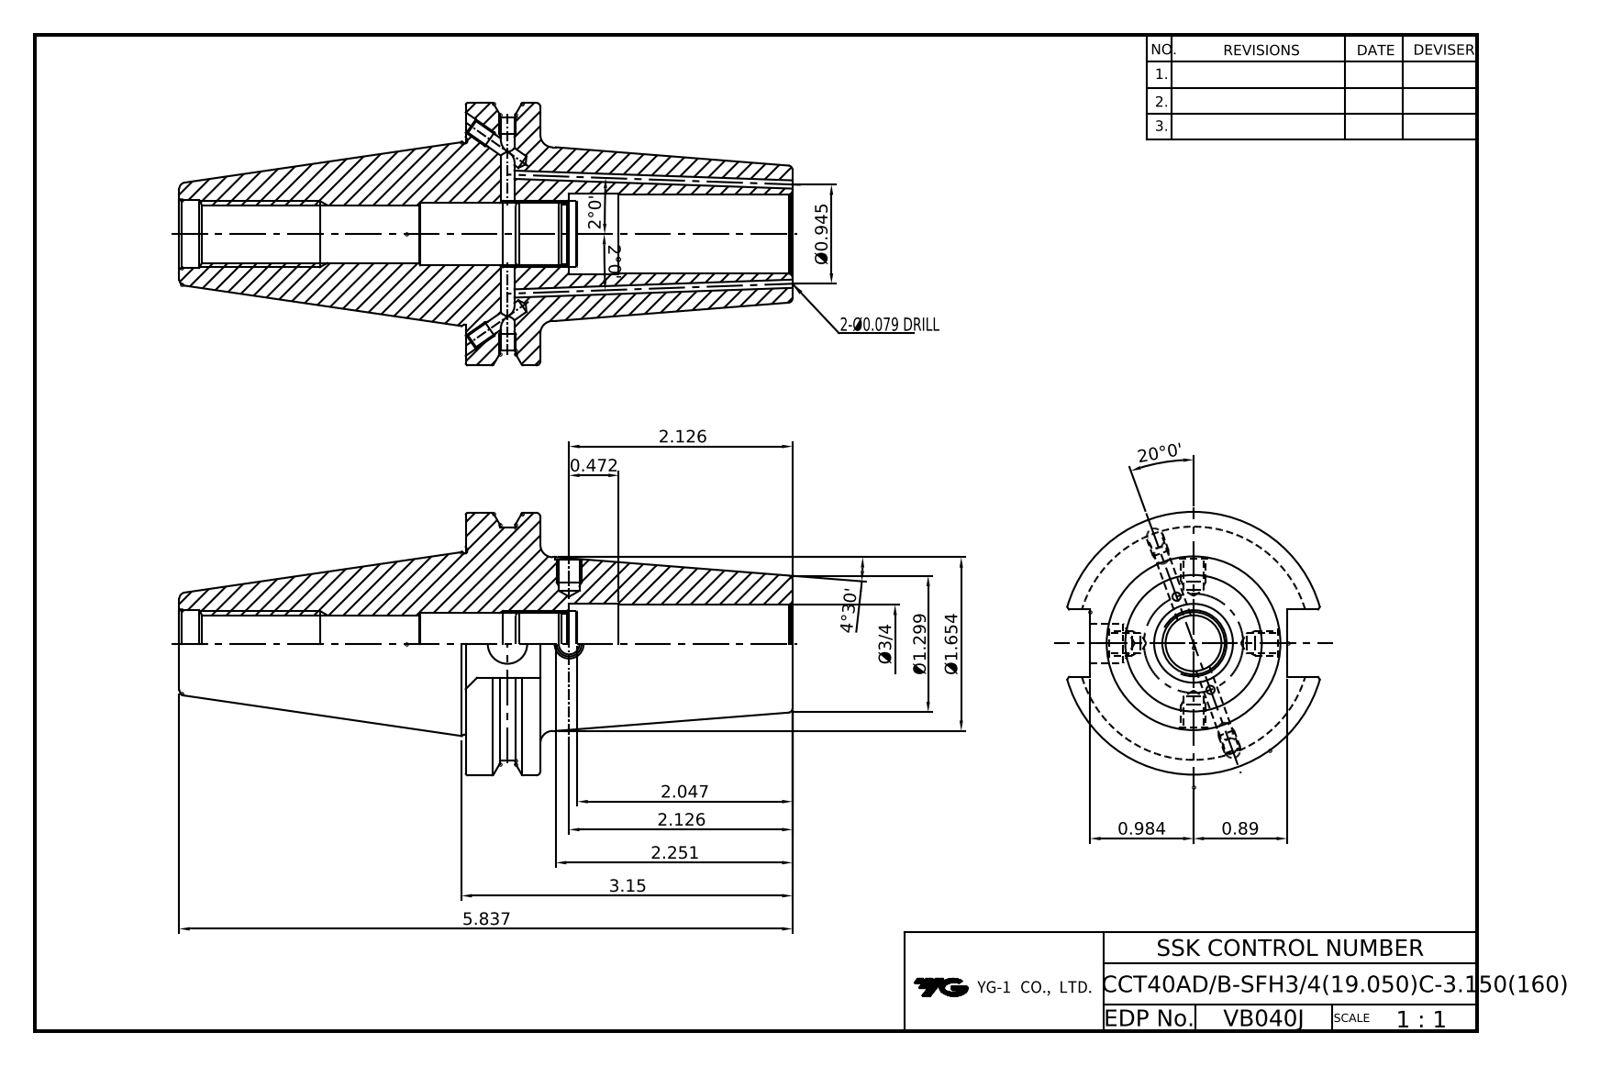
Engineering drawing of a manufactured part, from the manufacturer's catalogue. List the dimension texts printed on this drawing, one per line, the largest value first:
20°0'
5.837
4°30'
3.15
2.251
2.126
2.126
2.047
2°0'
2°0'
Ø1.654
Ø1.299
0.984
Ø0.945
0.89
0.472
